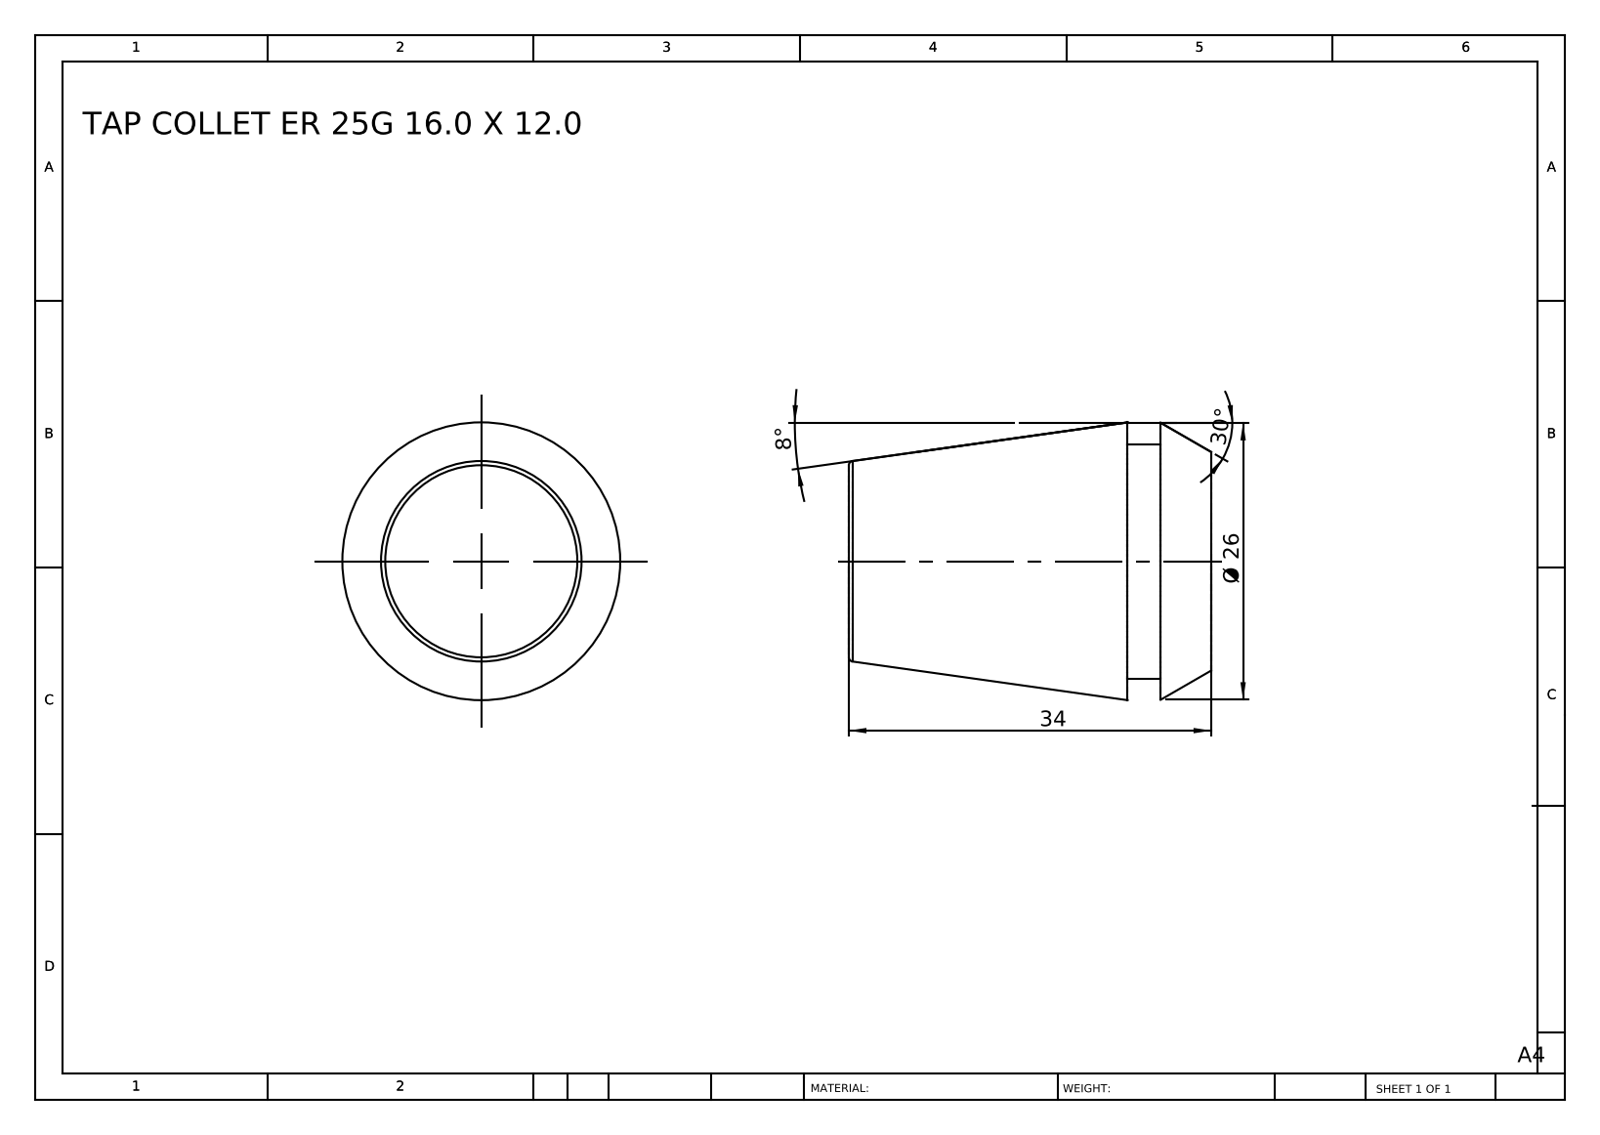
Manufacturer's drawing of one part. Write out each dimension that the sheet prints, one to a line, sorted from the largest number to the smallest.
34
30°
Ø 26
8°
